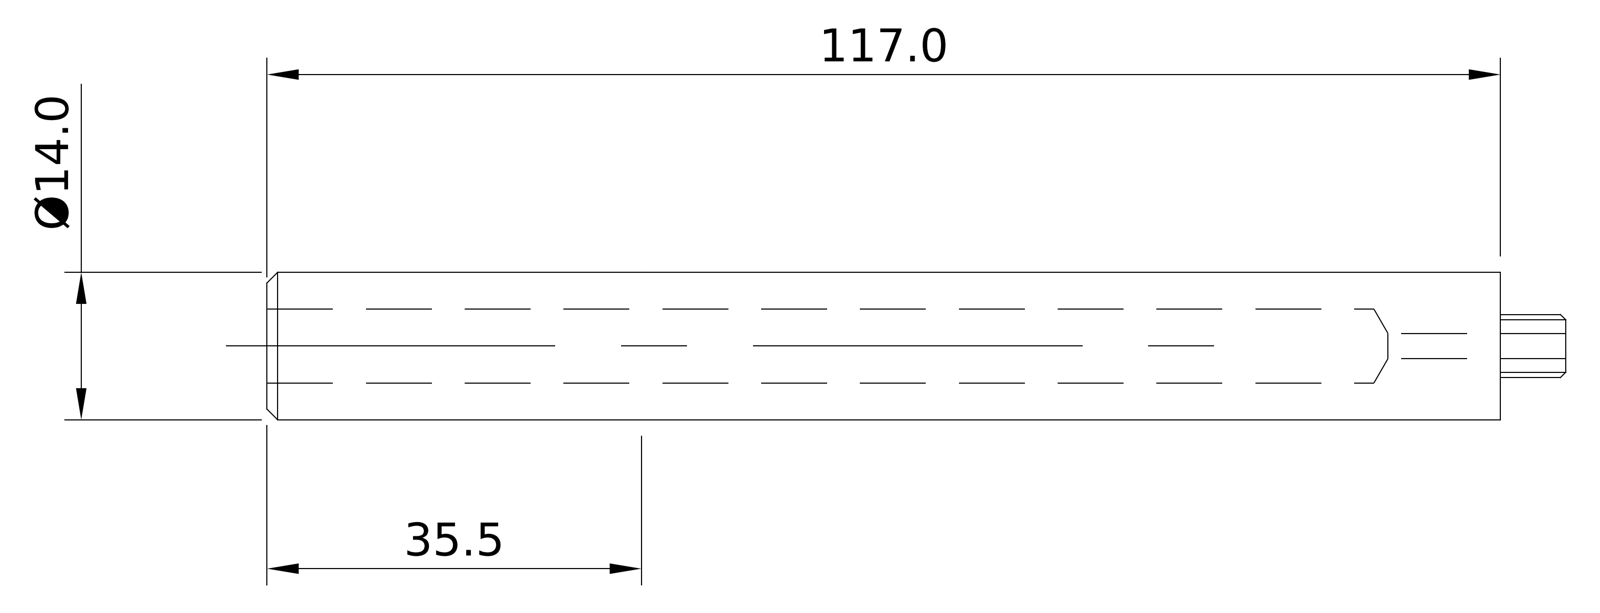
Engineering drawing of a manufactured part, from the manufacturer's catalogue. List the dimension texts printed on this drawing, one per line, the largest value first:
117.0
35.5
Ø14.0
